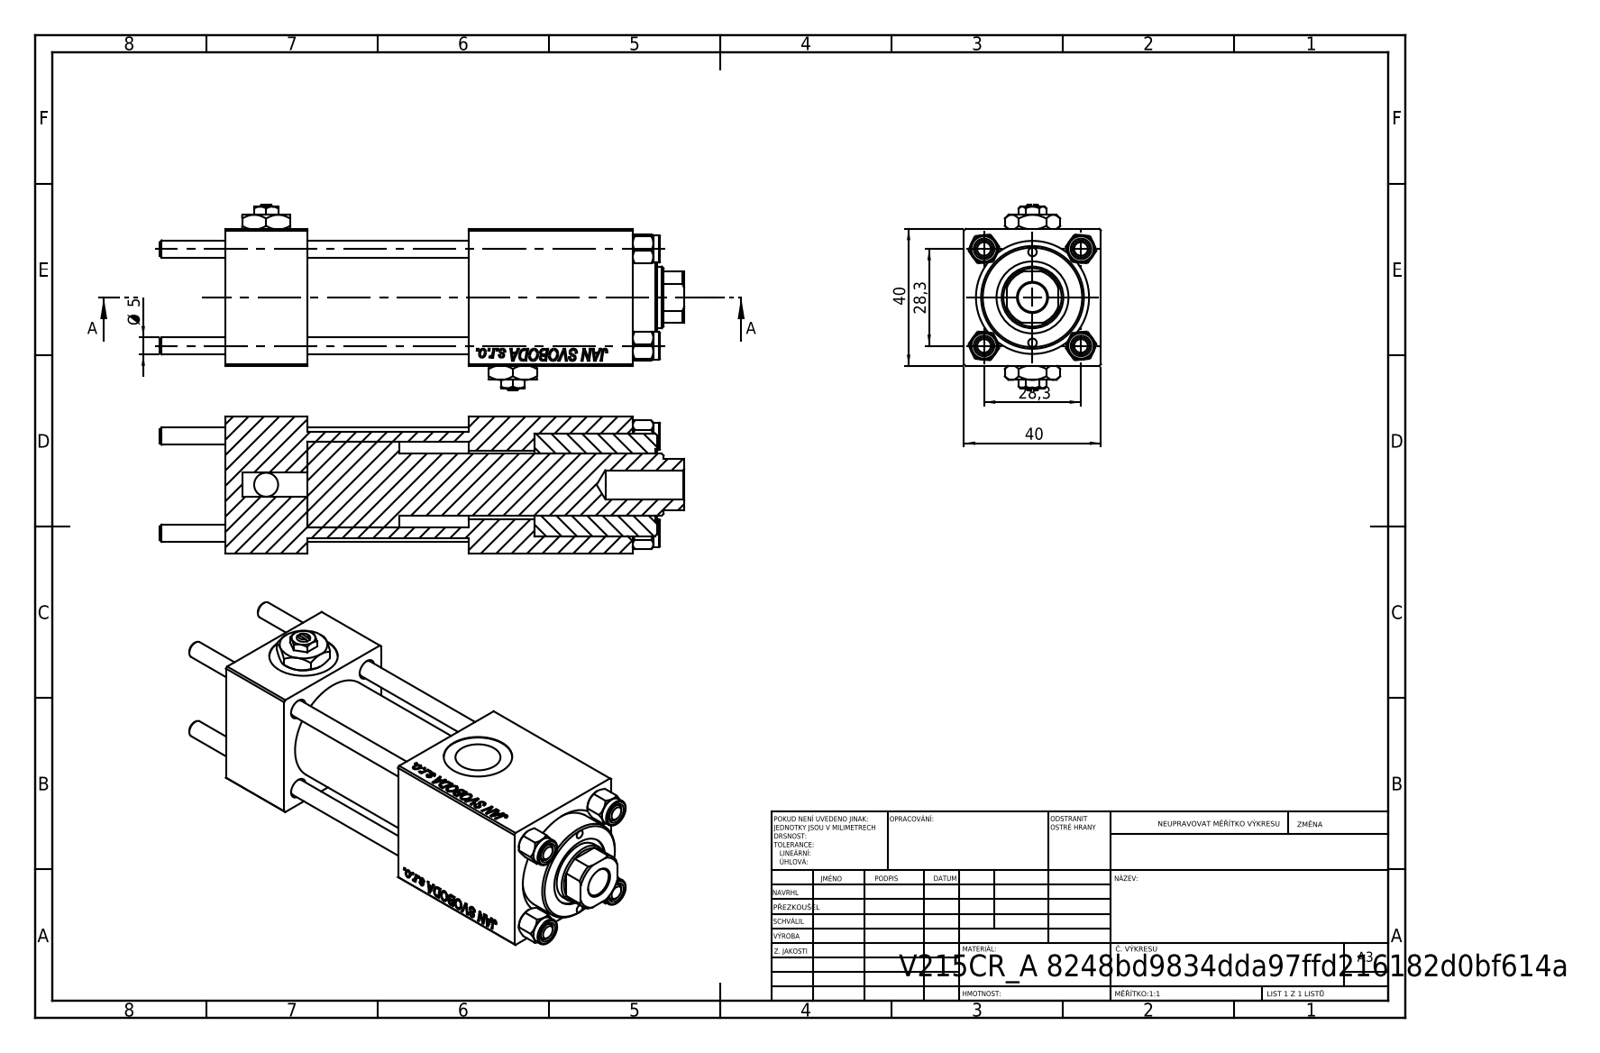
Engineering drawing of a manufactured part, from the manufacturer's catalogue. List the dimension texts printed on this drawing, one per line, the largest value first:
40
40
28,3
28,3
Ø 5
